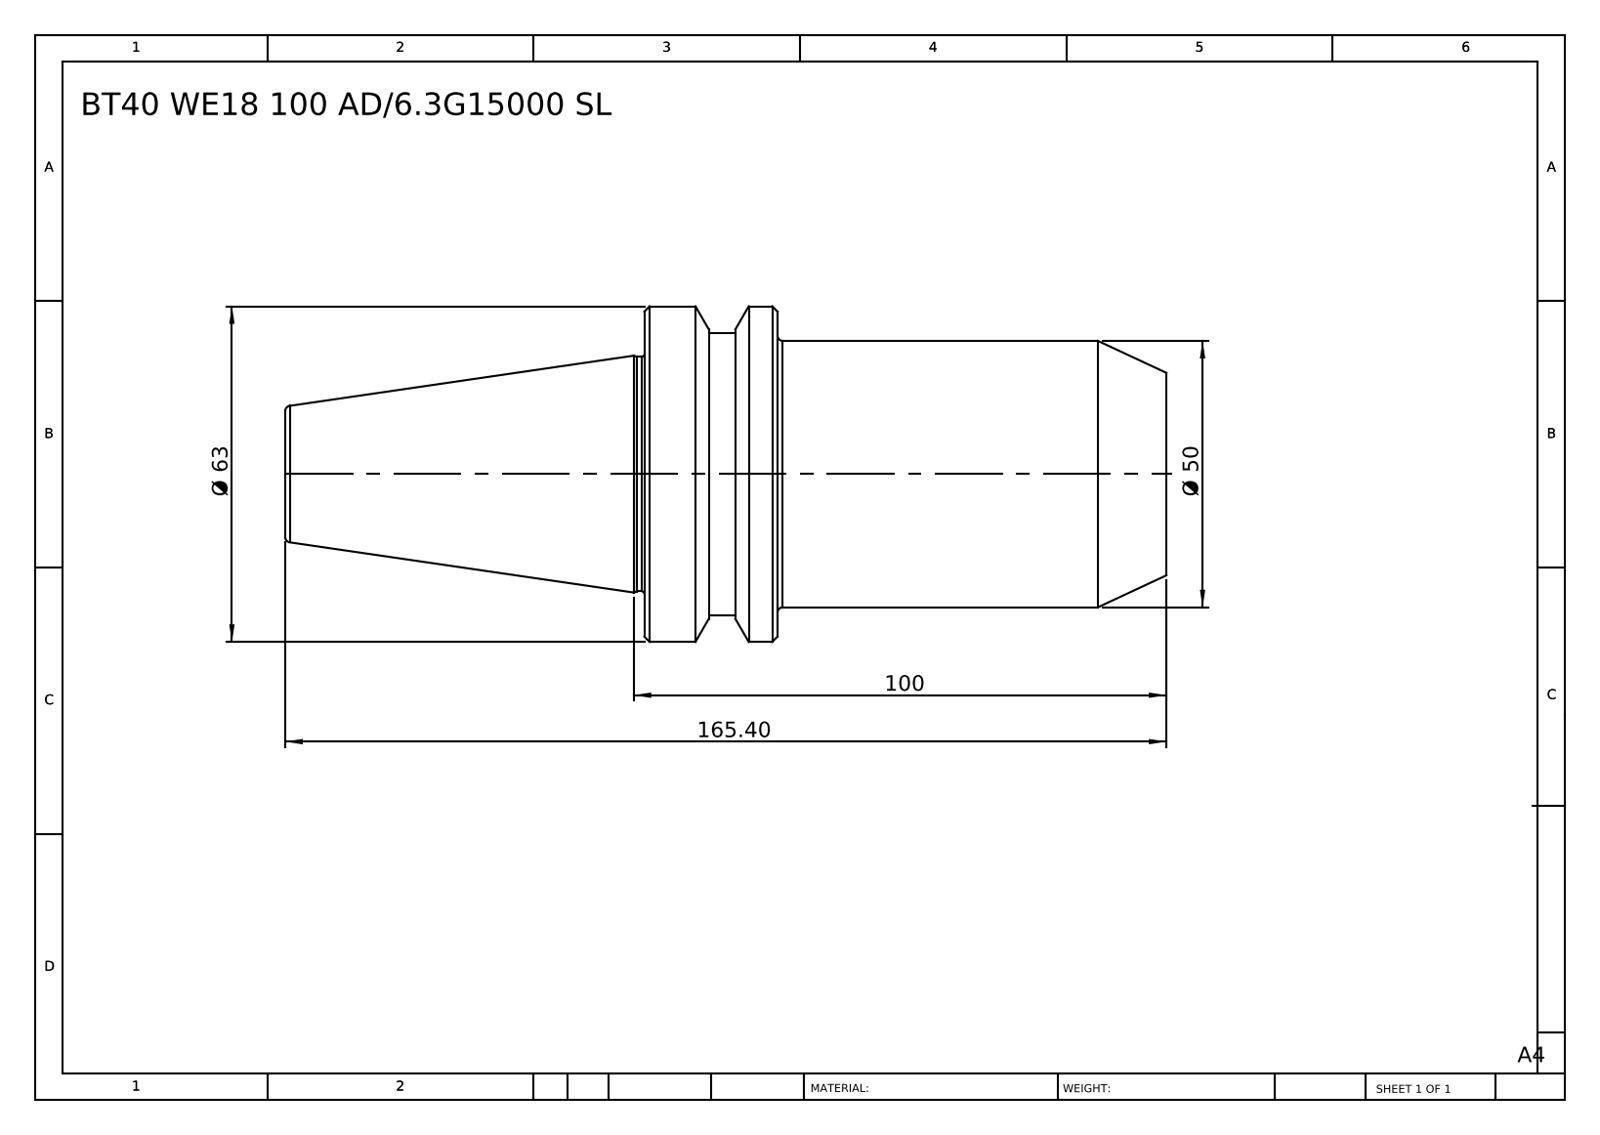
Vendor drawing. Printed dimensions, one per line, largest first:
165.40
100
Ø 63
Ø 50
